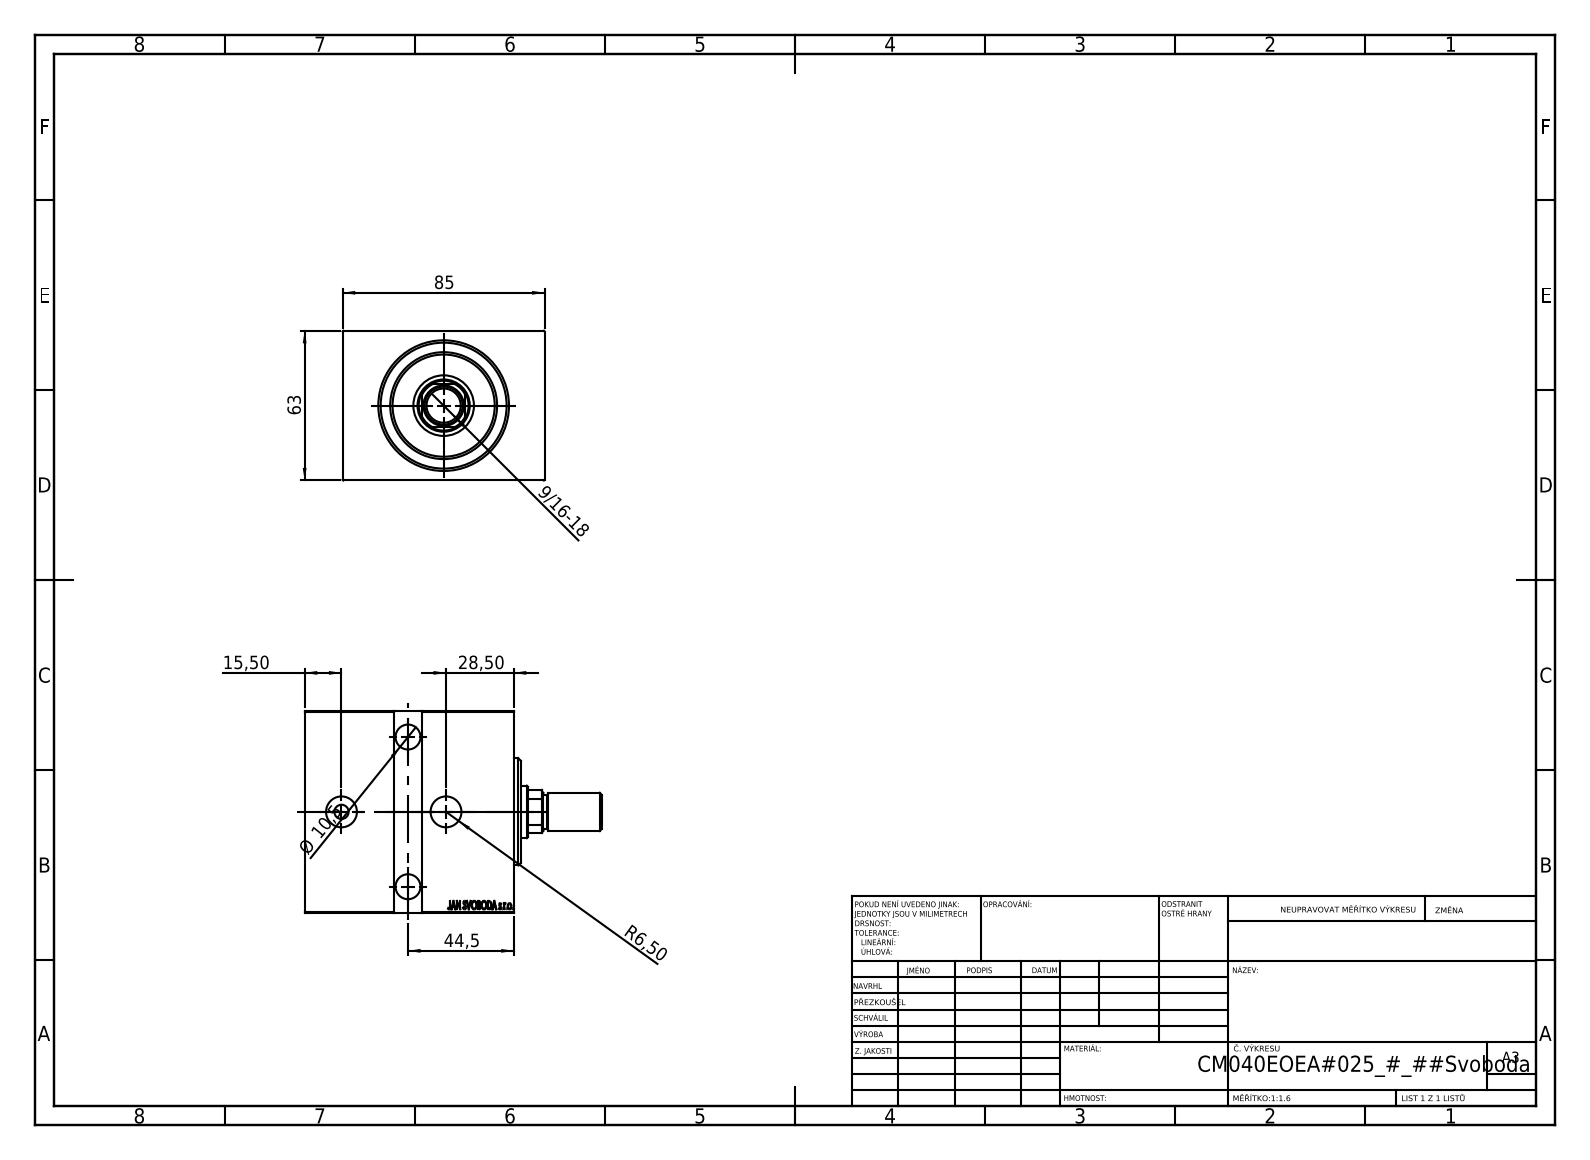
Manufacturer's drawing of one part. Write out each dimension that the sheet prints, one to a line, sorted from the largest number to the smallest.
85
63
44,5
28,50
15,50
Ø 10,5
R6,50
9/16-18
